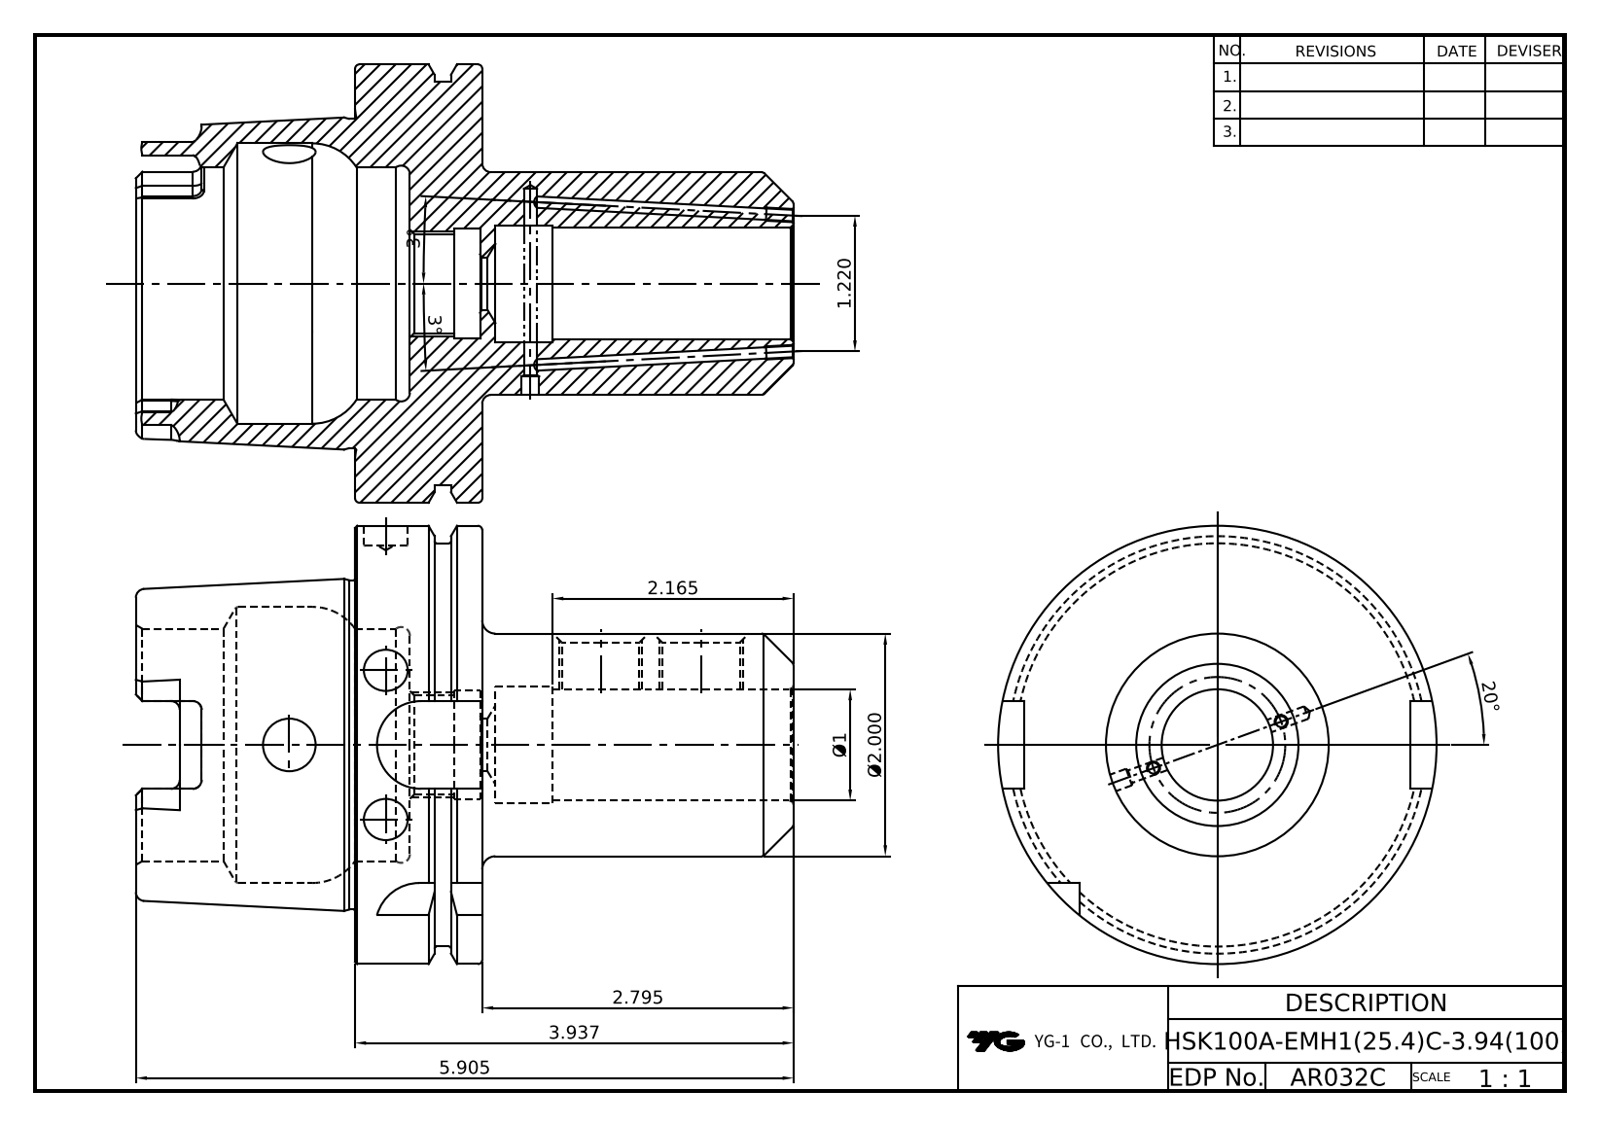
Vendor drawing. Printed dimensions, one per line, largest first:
20°
5.905
3.937
3°
3°
2.795
2.165
Ø2.000
1.220
Ø1
